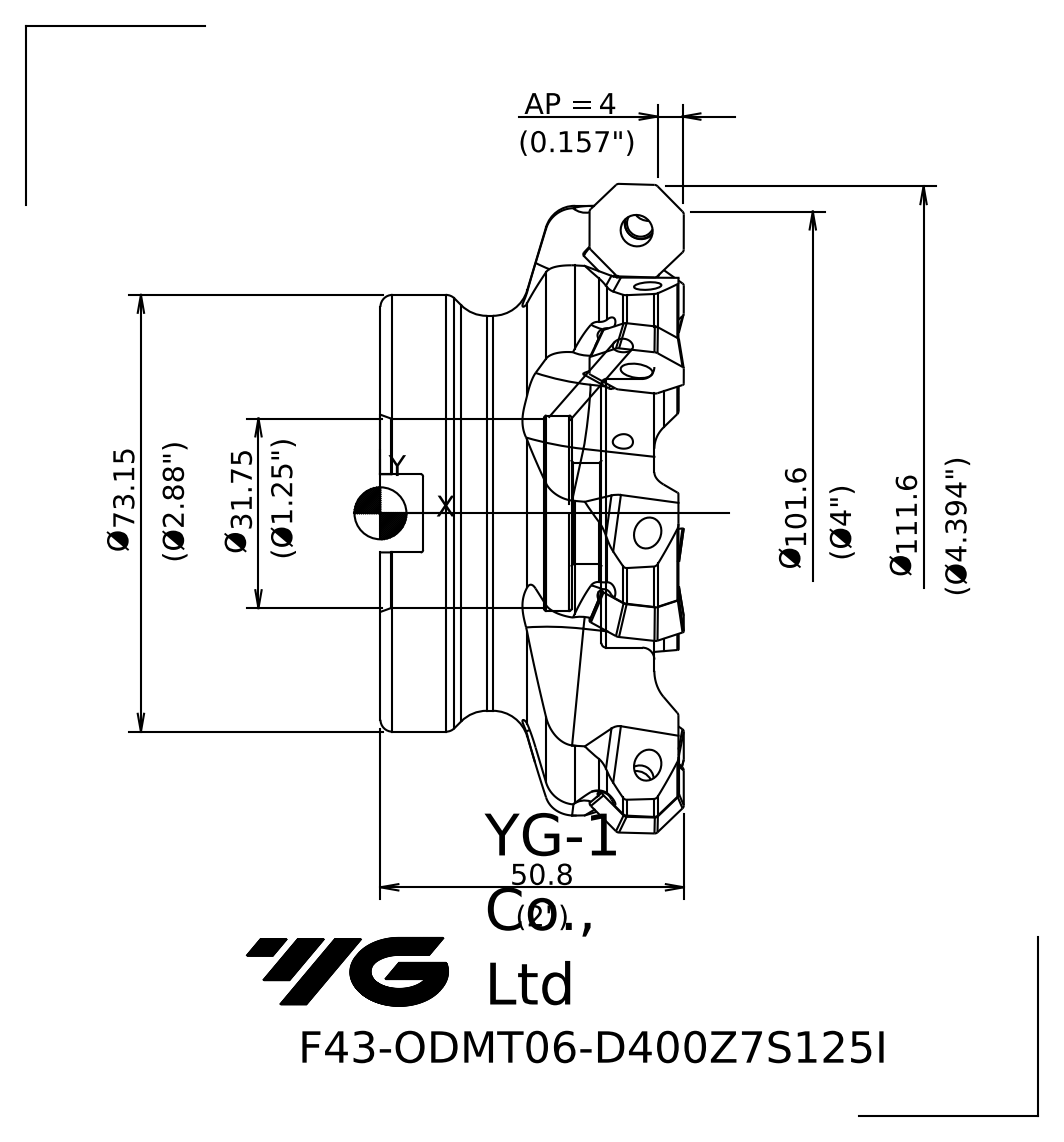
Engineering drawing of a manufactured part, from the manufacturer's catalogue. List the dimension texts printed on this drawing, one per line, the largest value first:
111.6 Ø
101.6 Ø
73.15 Ø
50.8
31.75 Ø
AP = 4
